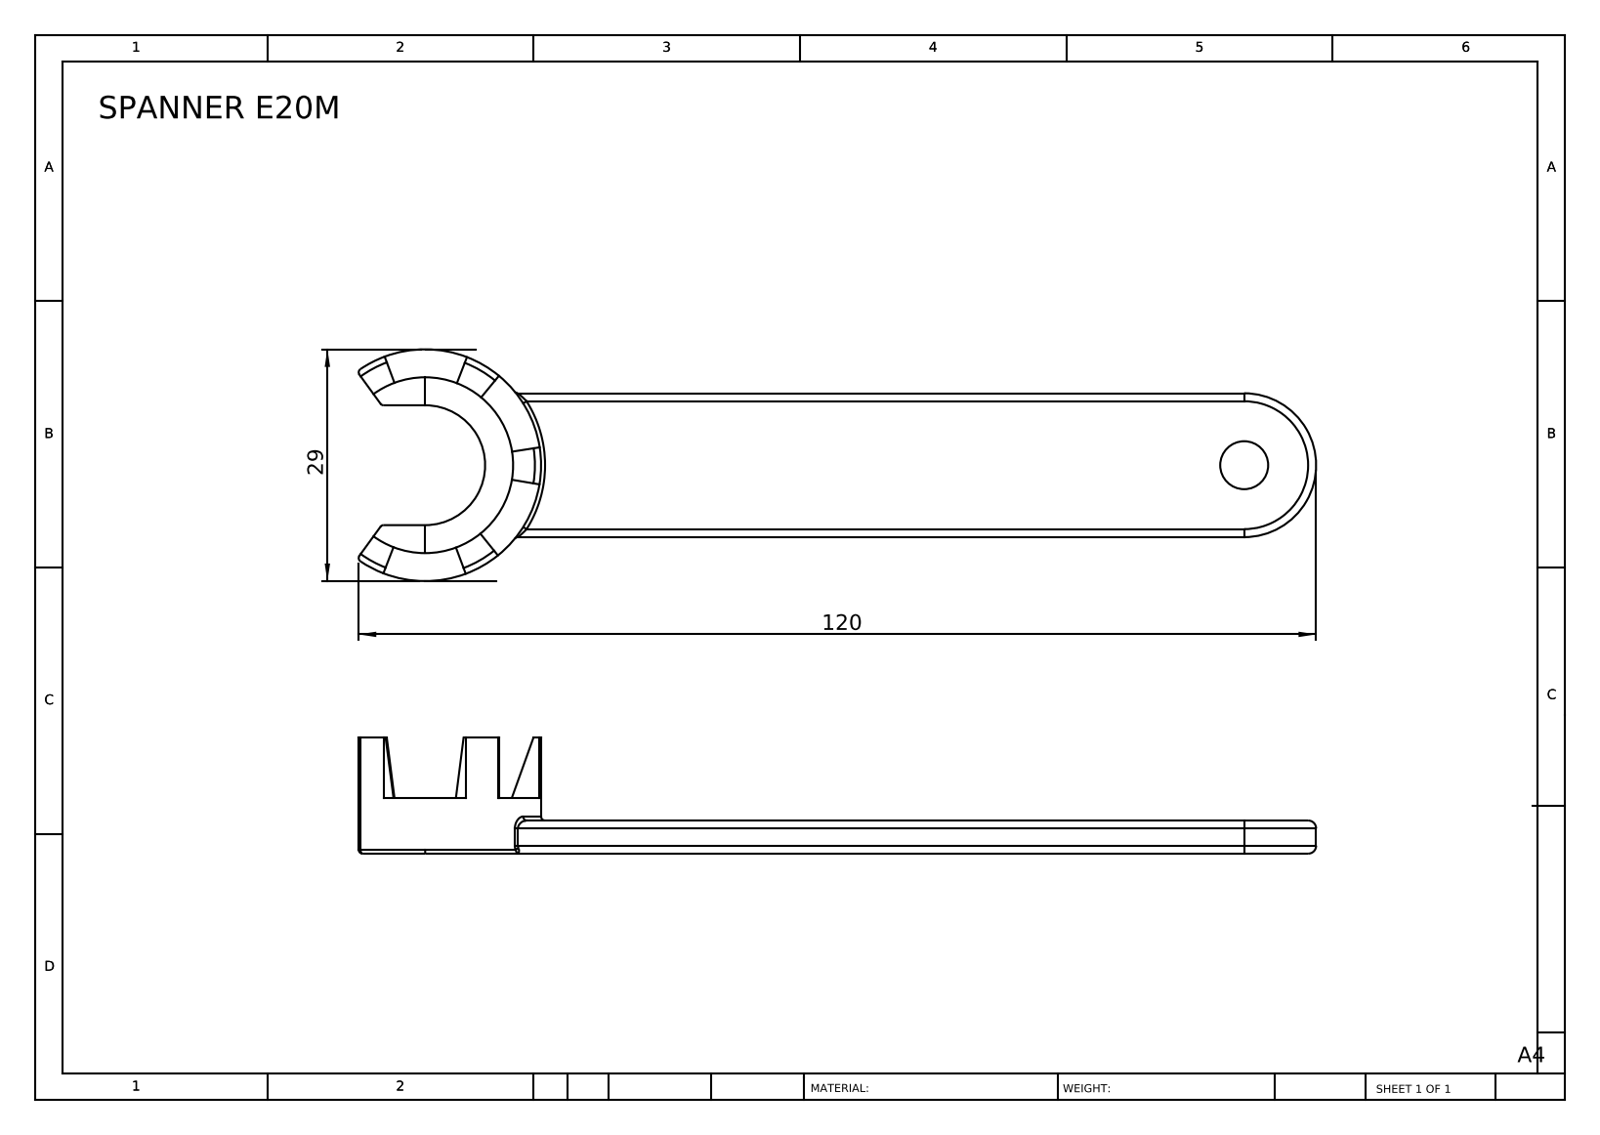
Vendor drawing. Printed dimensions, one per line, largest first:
120
29
